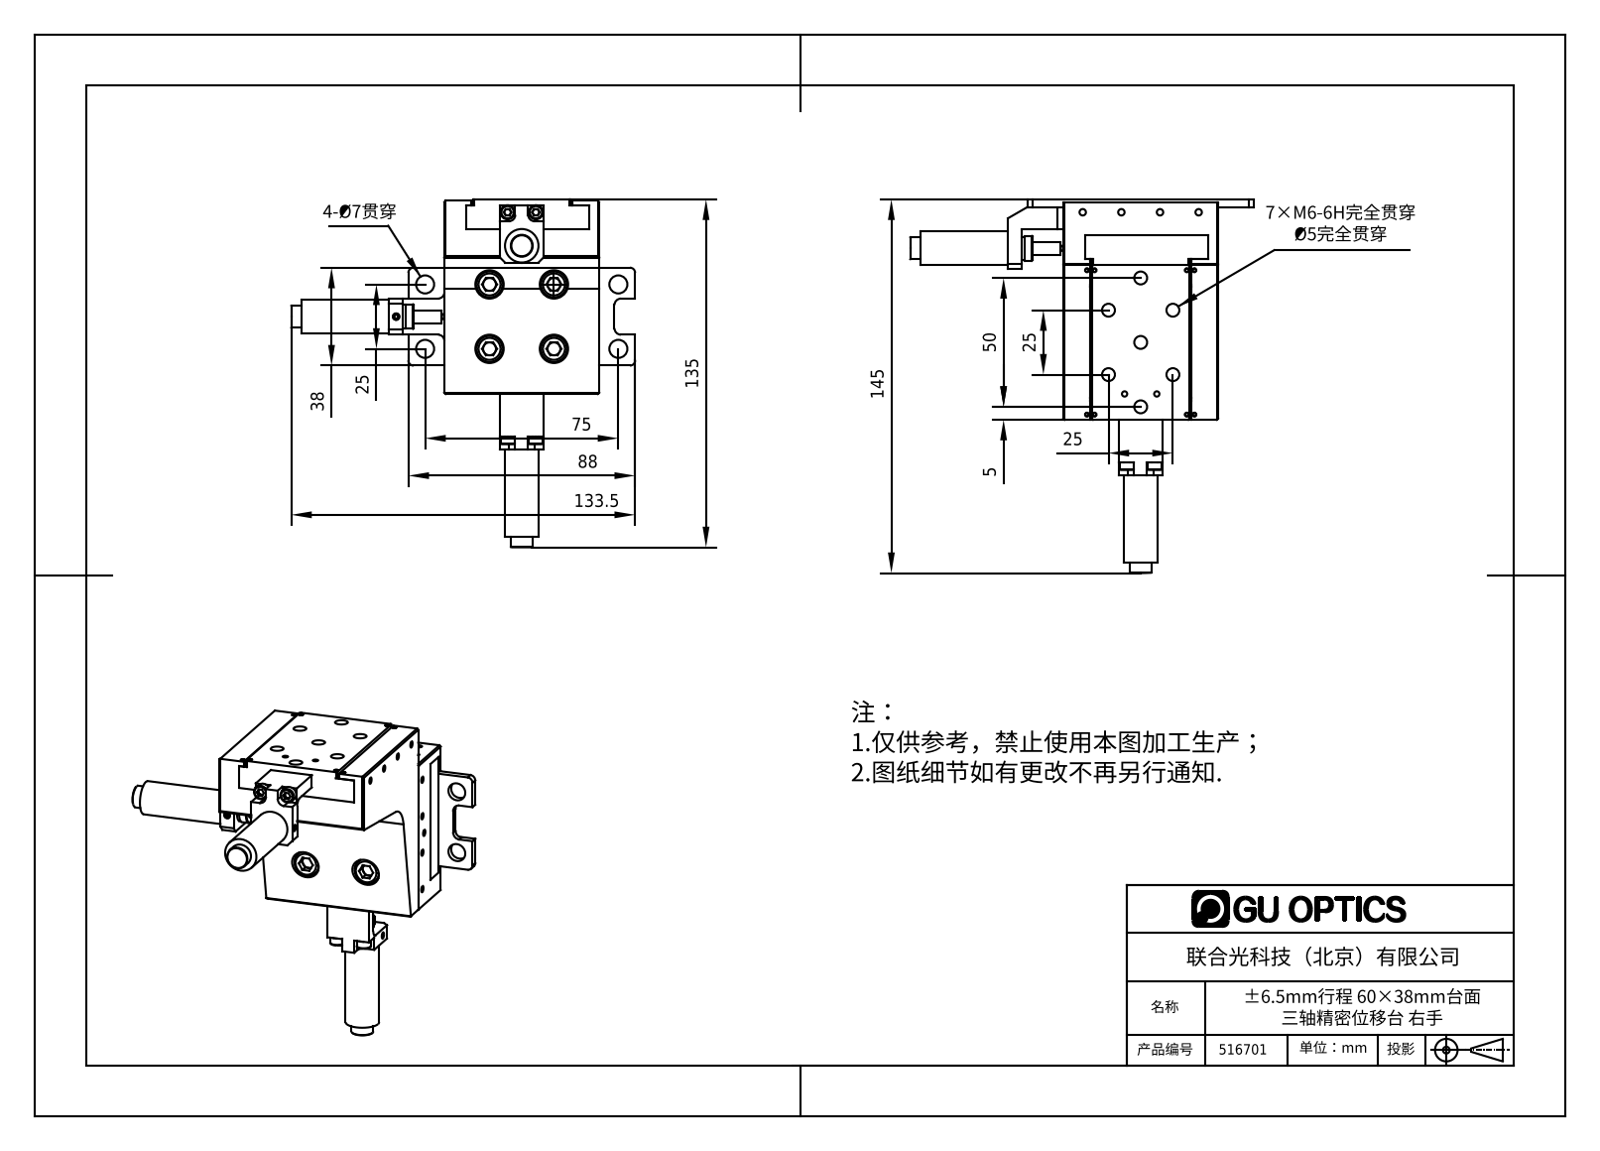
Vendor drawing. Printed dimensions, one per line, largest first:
145
135
133.5
88
75
50
38
25
25
25
5
